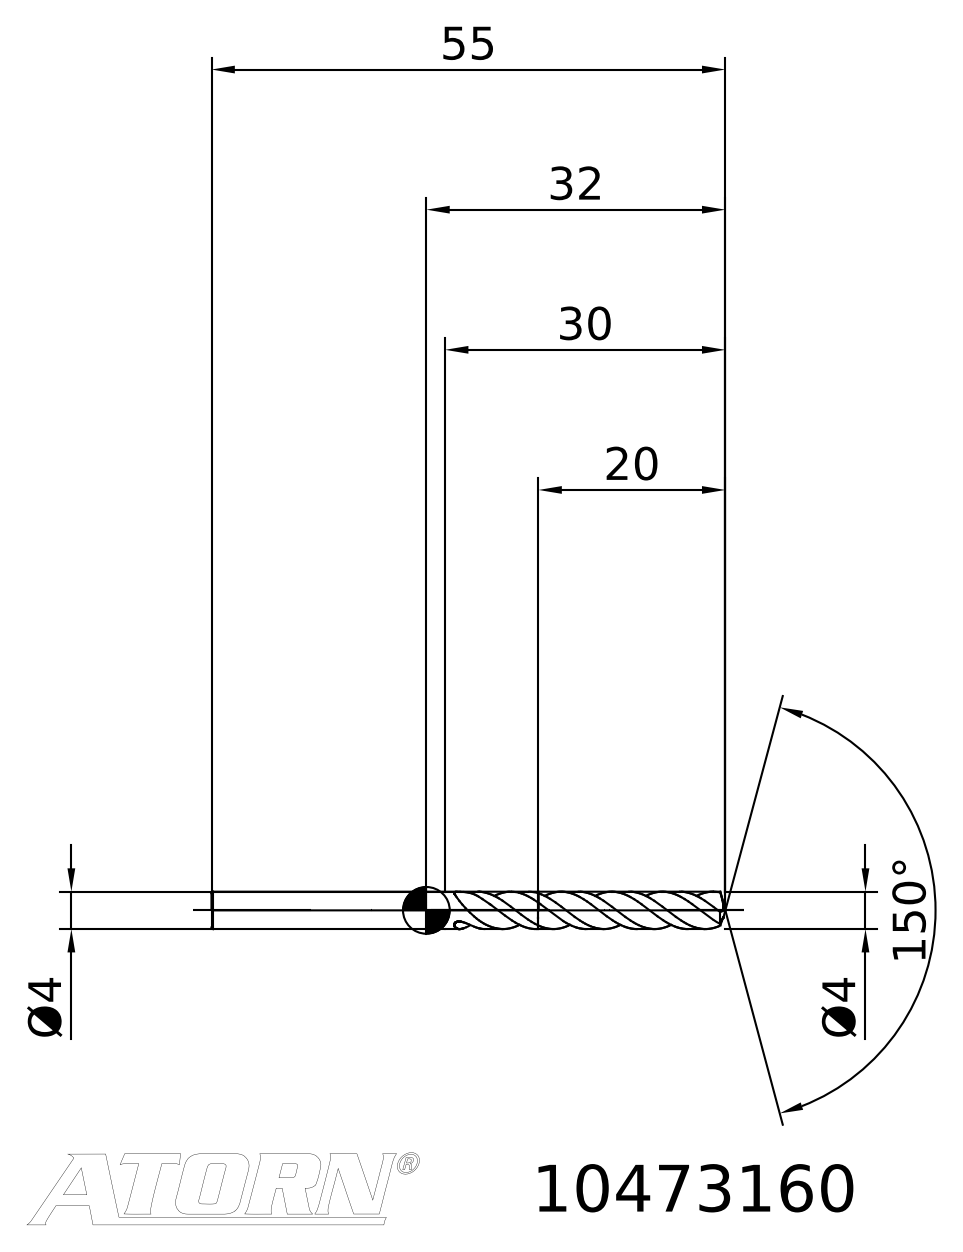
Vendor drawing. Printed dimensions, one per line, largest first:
150°
55
32
30
20
Ø4
Ø4
